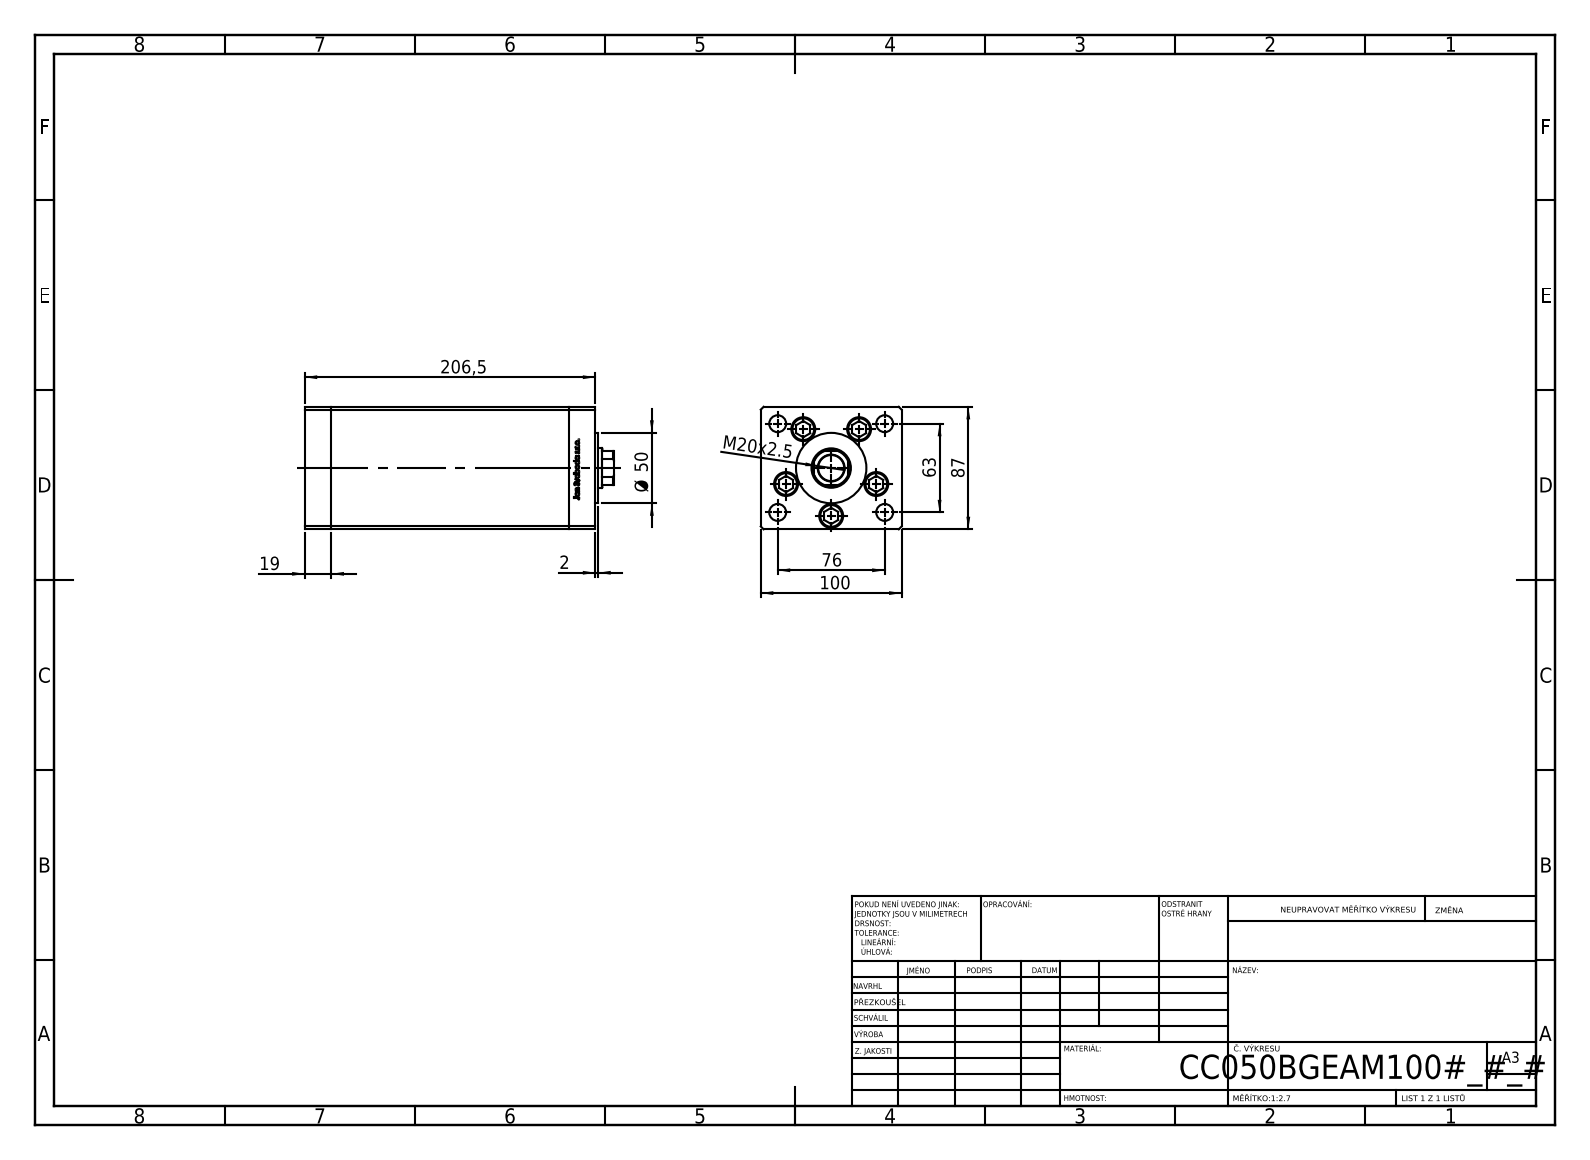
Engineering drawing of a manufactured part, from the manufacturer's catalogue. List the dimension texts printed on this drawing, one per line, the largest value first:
206,5
100
87
76
63
Ø 50
M20x2.5
19
2
